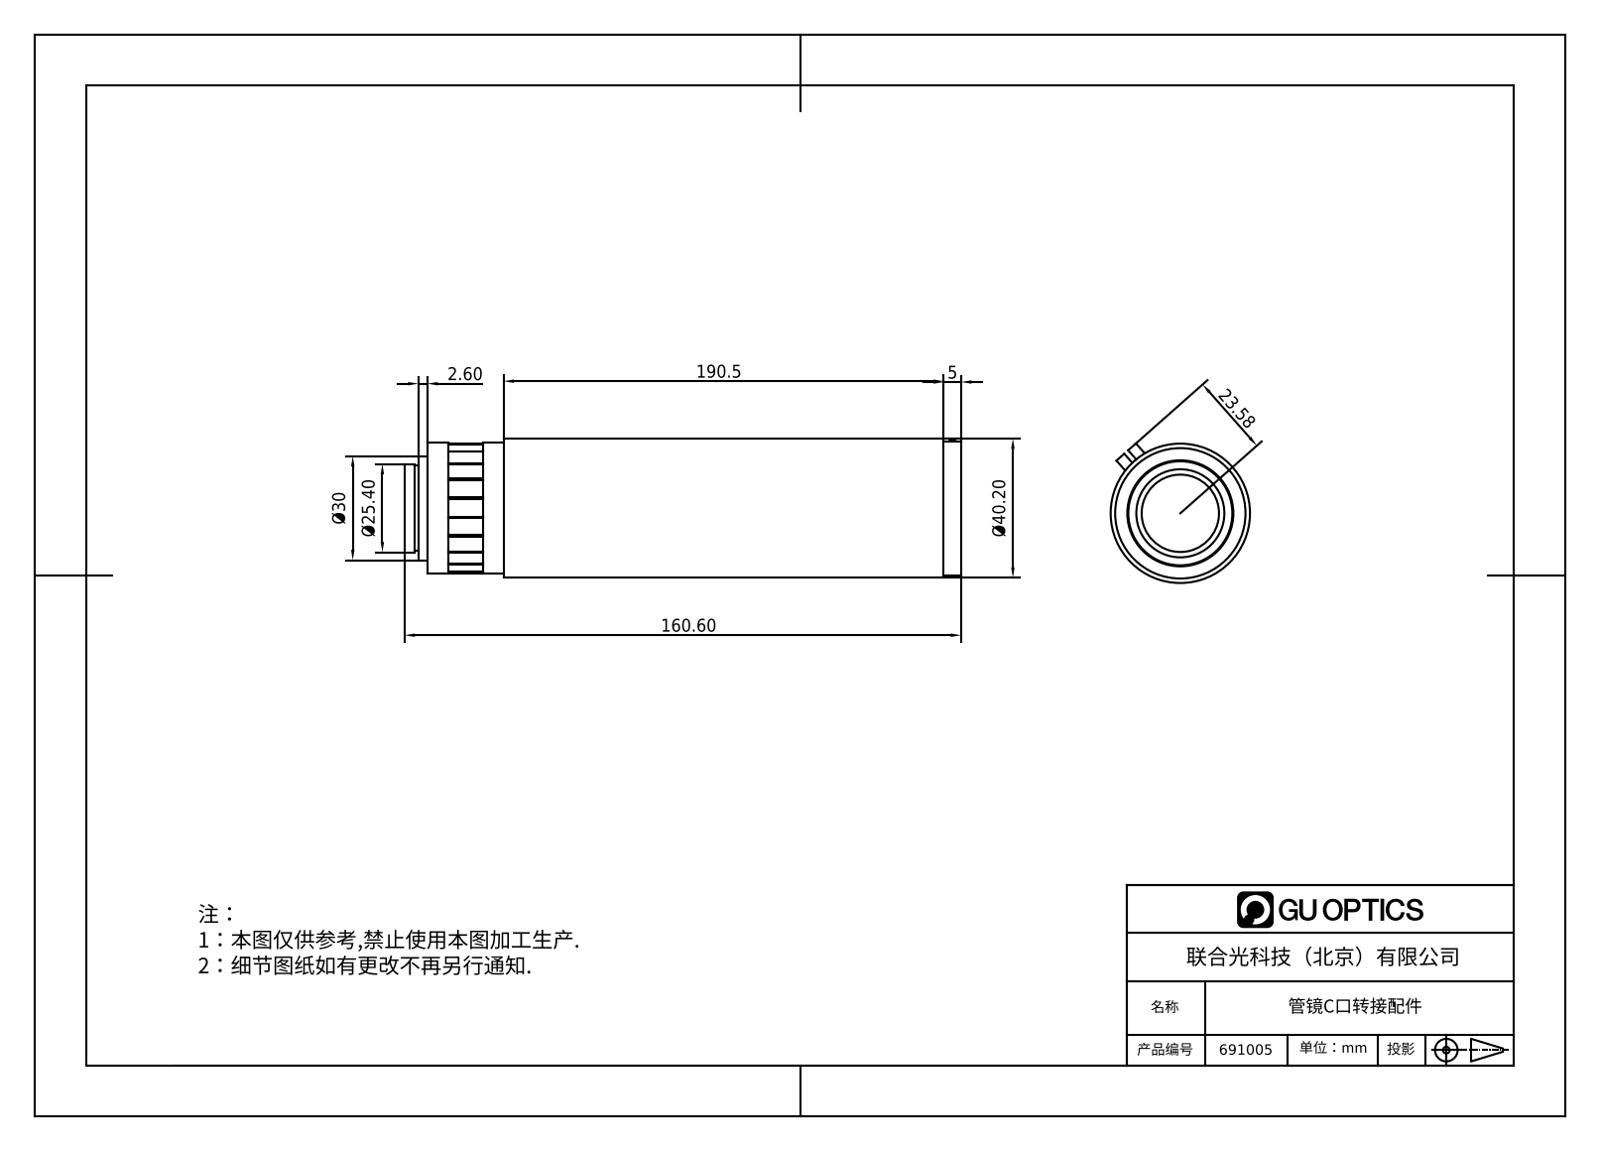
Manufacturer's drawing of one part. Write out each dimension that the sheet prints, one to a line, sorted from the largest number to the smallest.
190.5
160.60
Ø40.20
Ø30
Ø25.40
23.58
5
2.60
